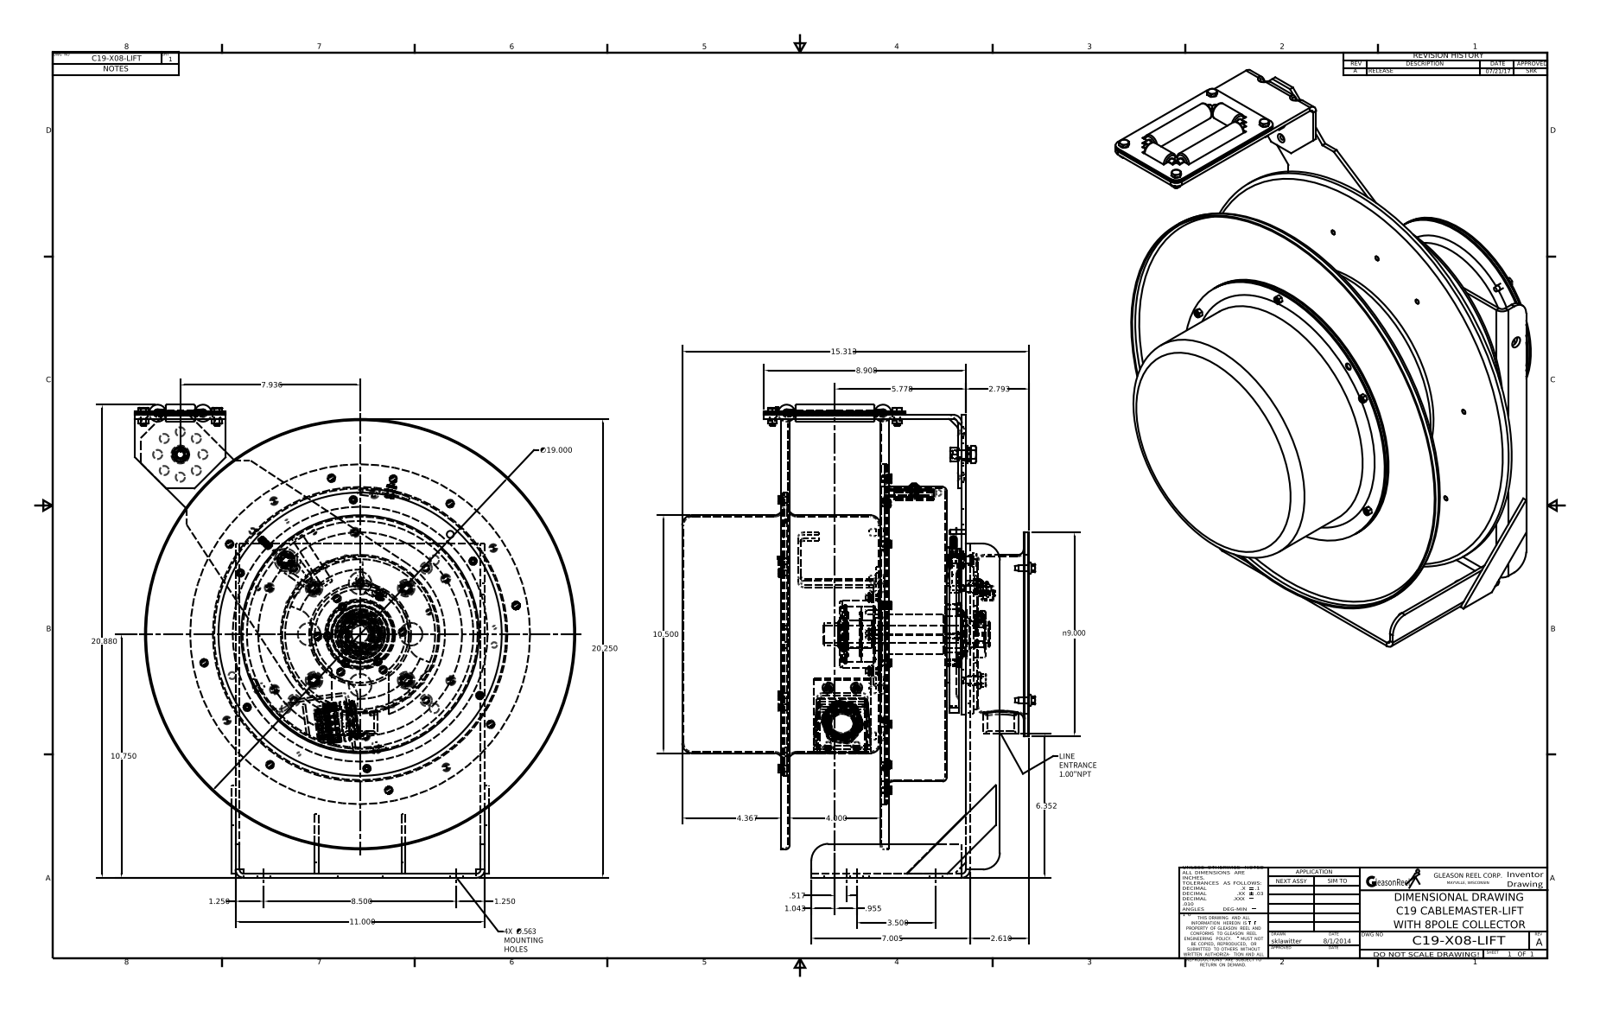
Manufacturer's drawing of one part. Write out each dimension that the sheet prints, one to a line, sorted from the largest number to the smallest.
20.880
20.250
∅19.000
15.313
11.000
10.750
10.500
n9.000
8.908
8.500
7.936
7.005
6.352
5.778
4.367
4.000
3.500
2.793
2.610
1.250
1.250
1.043
.955
.517
